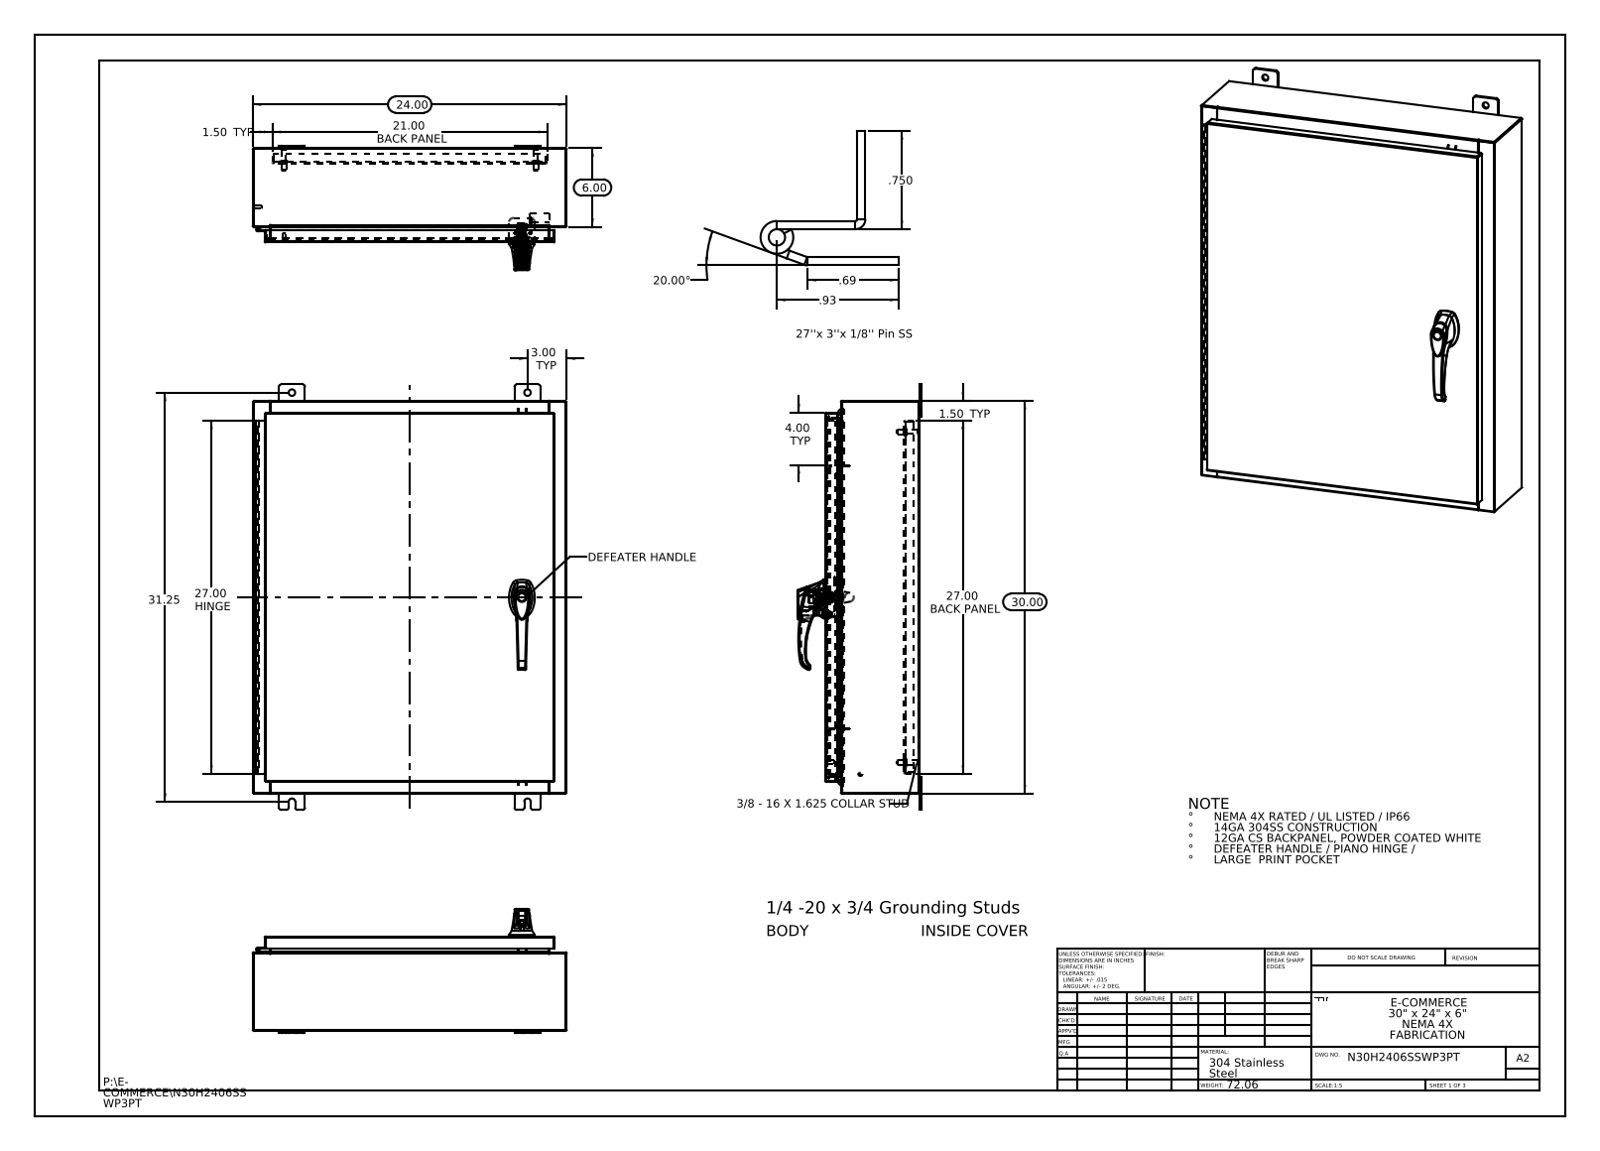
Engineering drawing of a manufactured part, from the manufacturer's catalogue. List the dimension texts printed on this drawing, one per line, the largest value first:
31.25
30.00
27.00 HINGE
27.00 BACK PANEL
24.00
21.00 BACK PANEL
20.00°
6.00
4.00 TYP
3.00 TYP
1.50 TYP
1.50 TYP
.93
.750
.69
